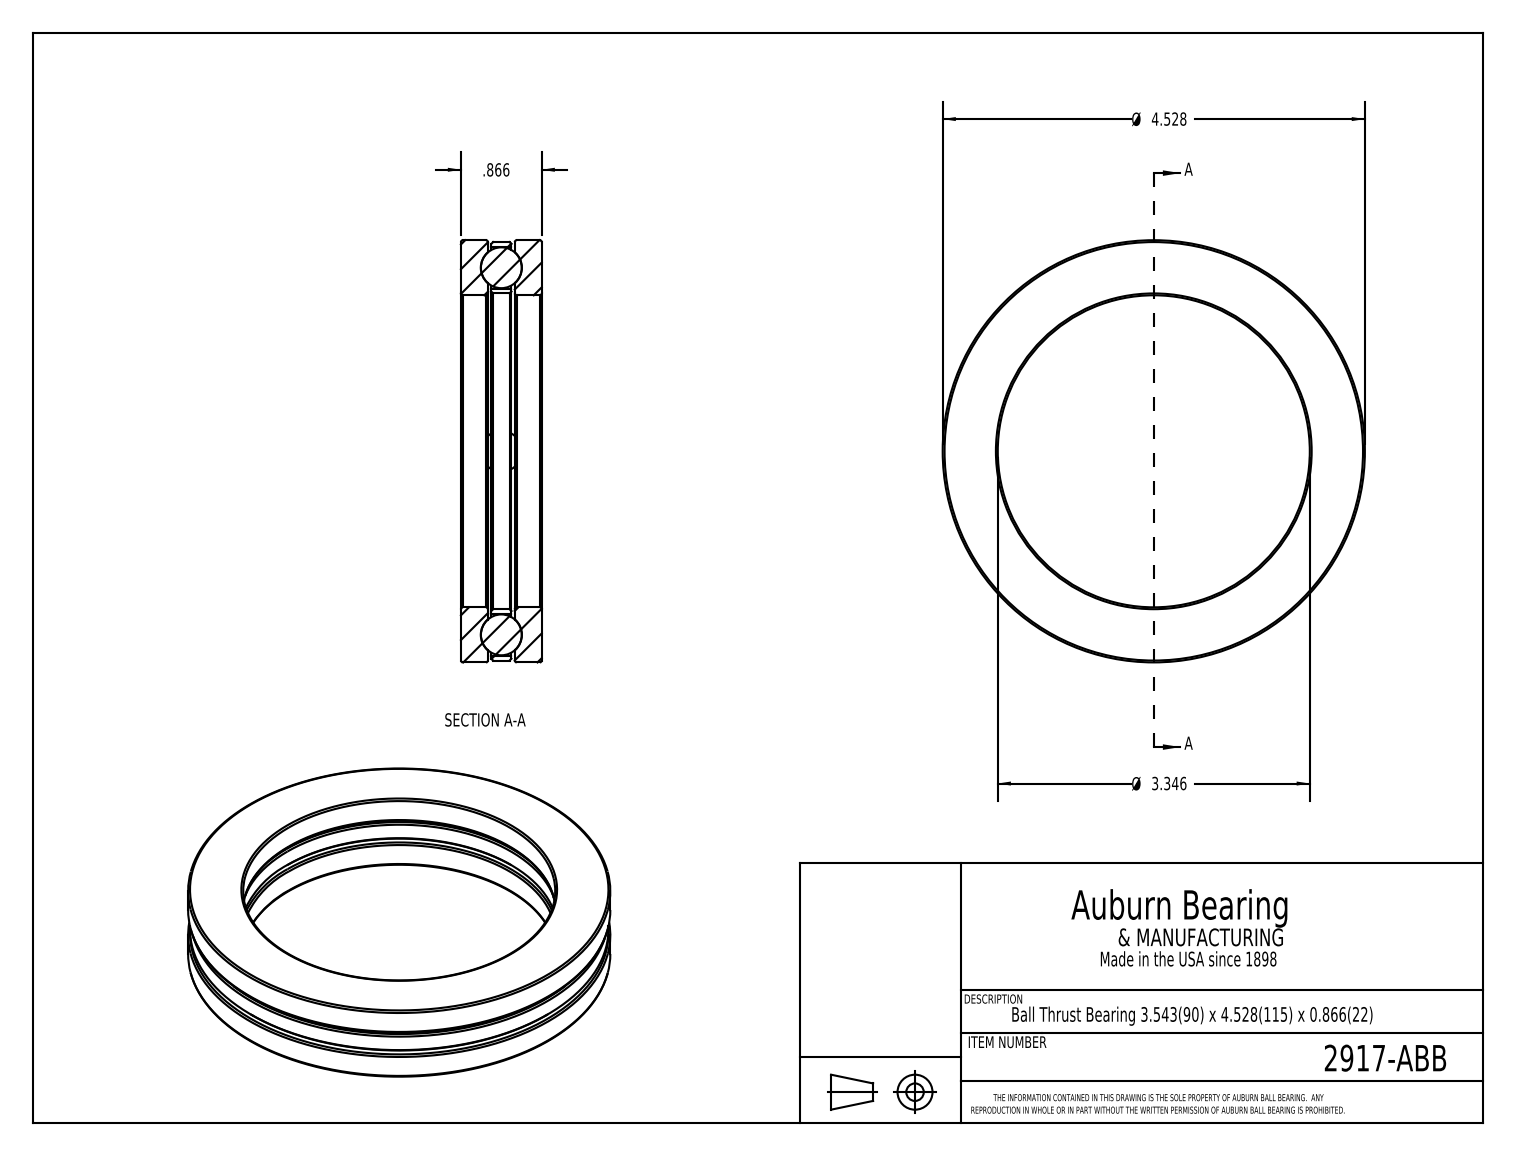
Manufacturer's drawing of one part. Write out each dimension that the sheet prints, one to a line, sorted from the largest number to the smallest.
Ø 4.528
Ø 3.346
.866
